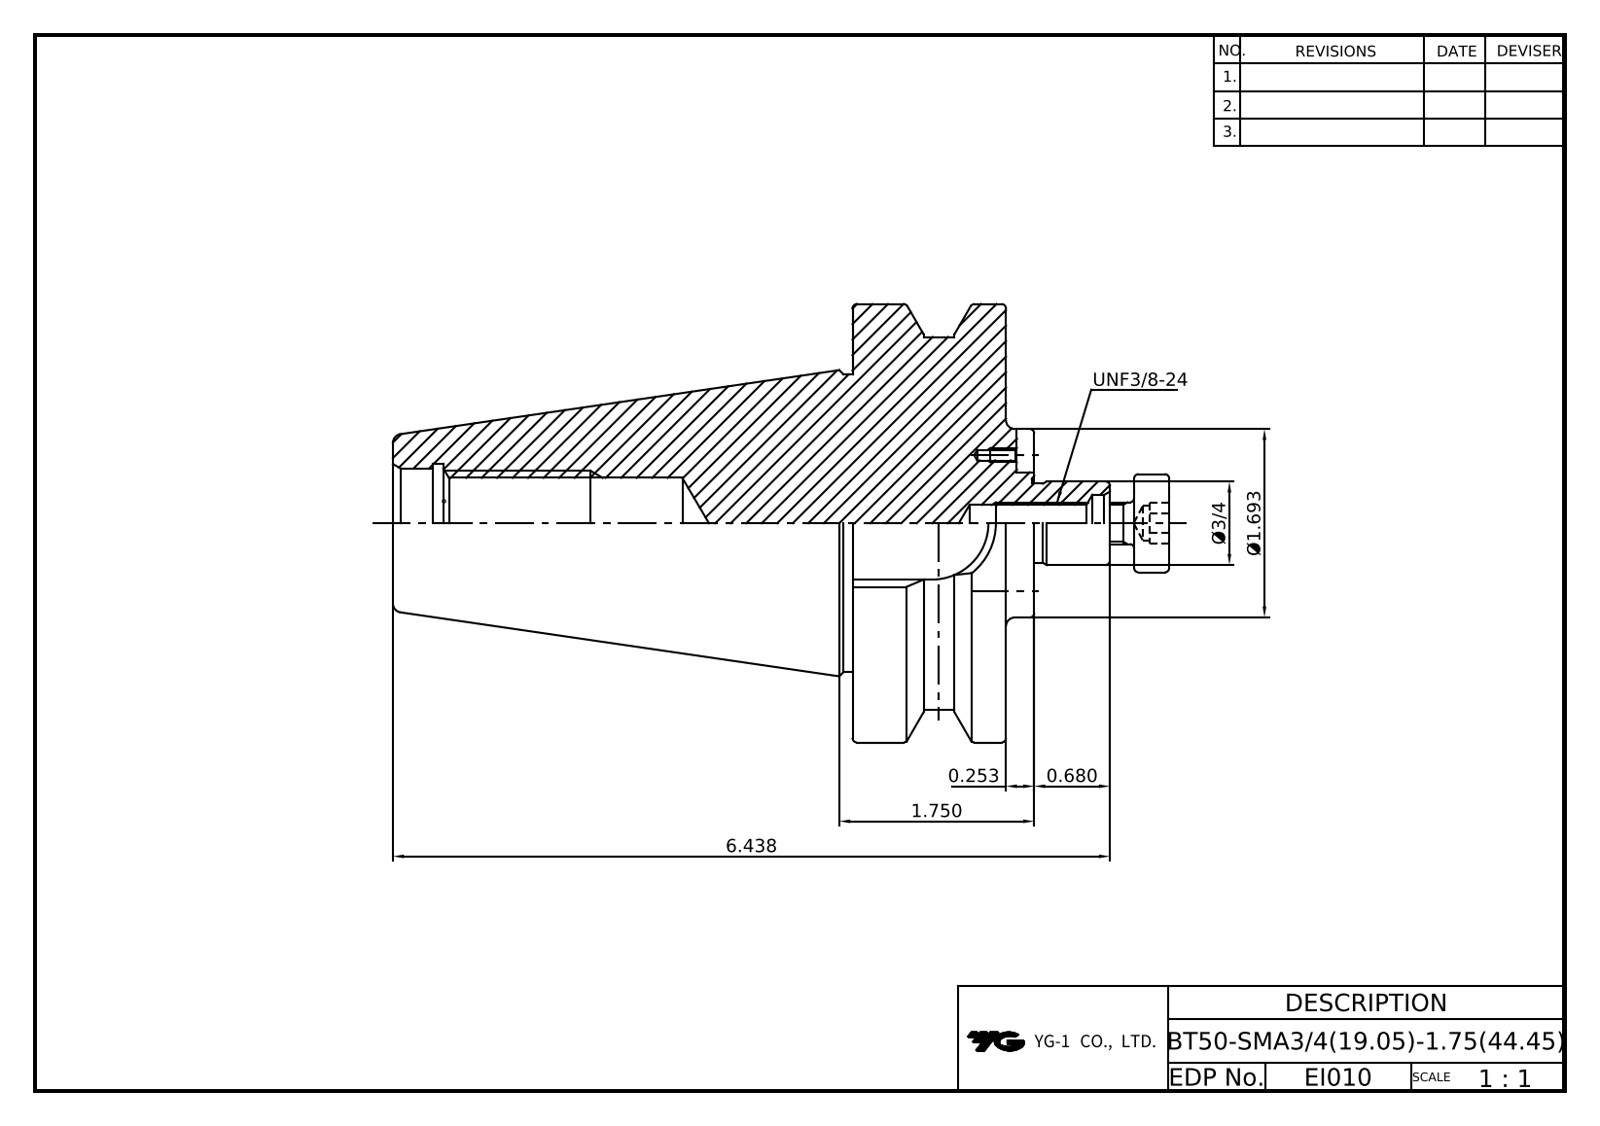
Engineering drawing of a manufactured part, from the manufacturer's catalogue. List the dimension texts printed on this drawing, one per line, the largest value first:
6.438
1.750
Ø1.693
Ø3/4
0.680
0.253
